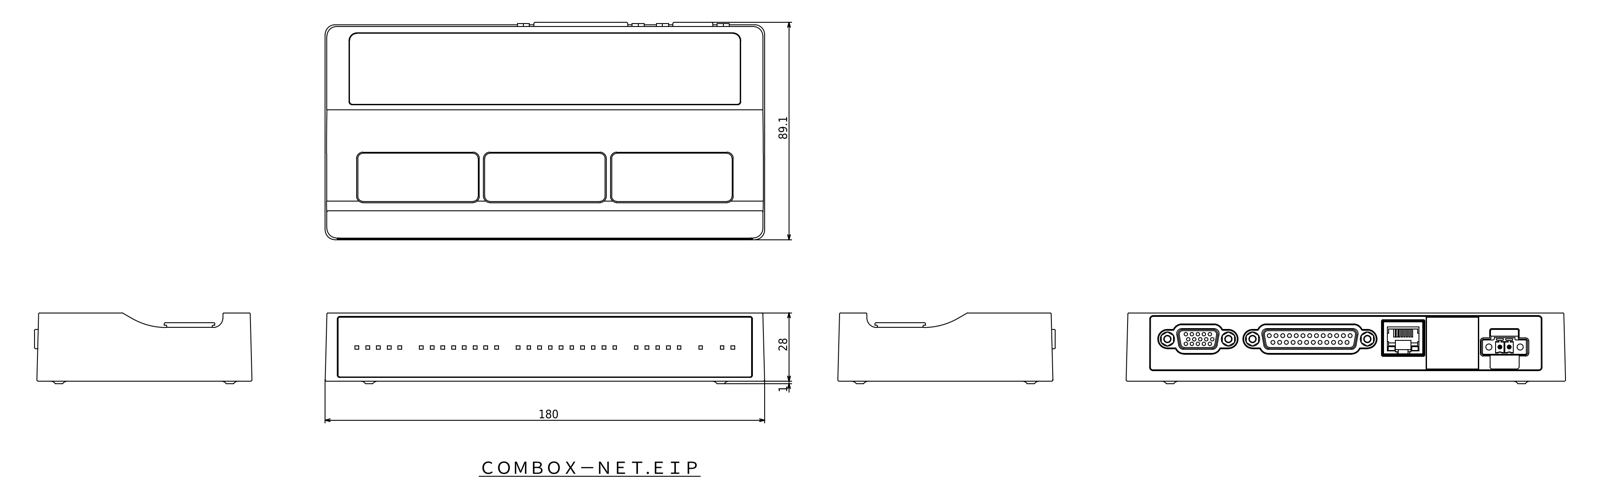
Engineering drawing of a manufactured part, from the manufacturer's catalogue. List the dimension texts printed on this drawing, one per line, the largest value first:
180
89.1
28
1
